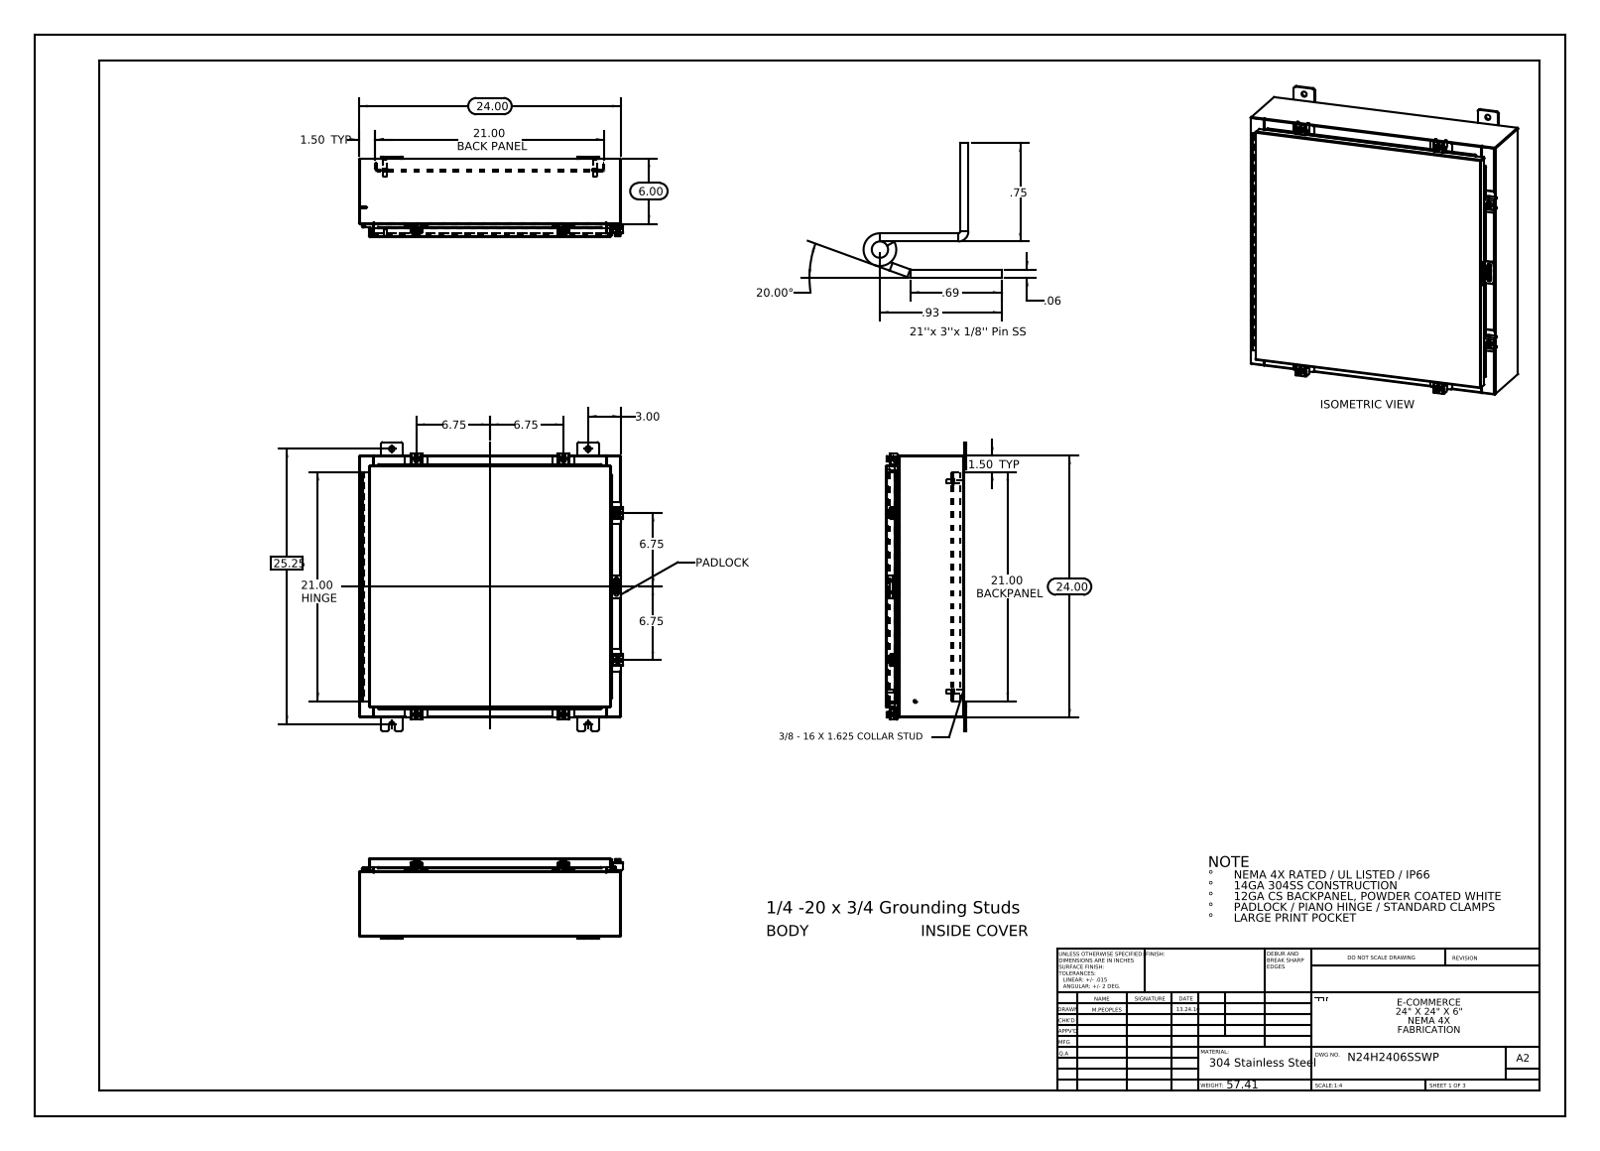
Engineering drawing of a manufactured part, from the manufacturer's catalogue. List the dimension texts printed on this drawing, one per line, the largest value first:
25.25
24.00
24.00
21.00 HINGE
21.00 BACK PANEL
21.00 BACKPANEL
20.00°
6.75
6.75
6.75
6.75
6.00
3.00
1.50 TYP
1.50 TYP
.93
.75
.69
.06
